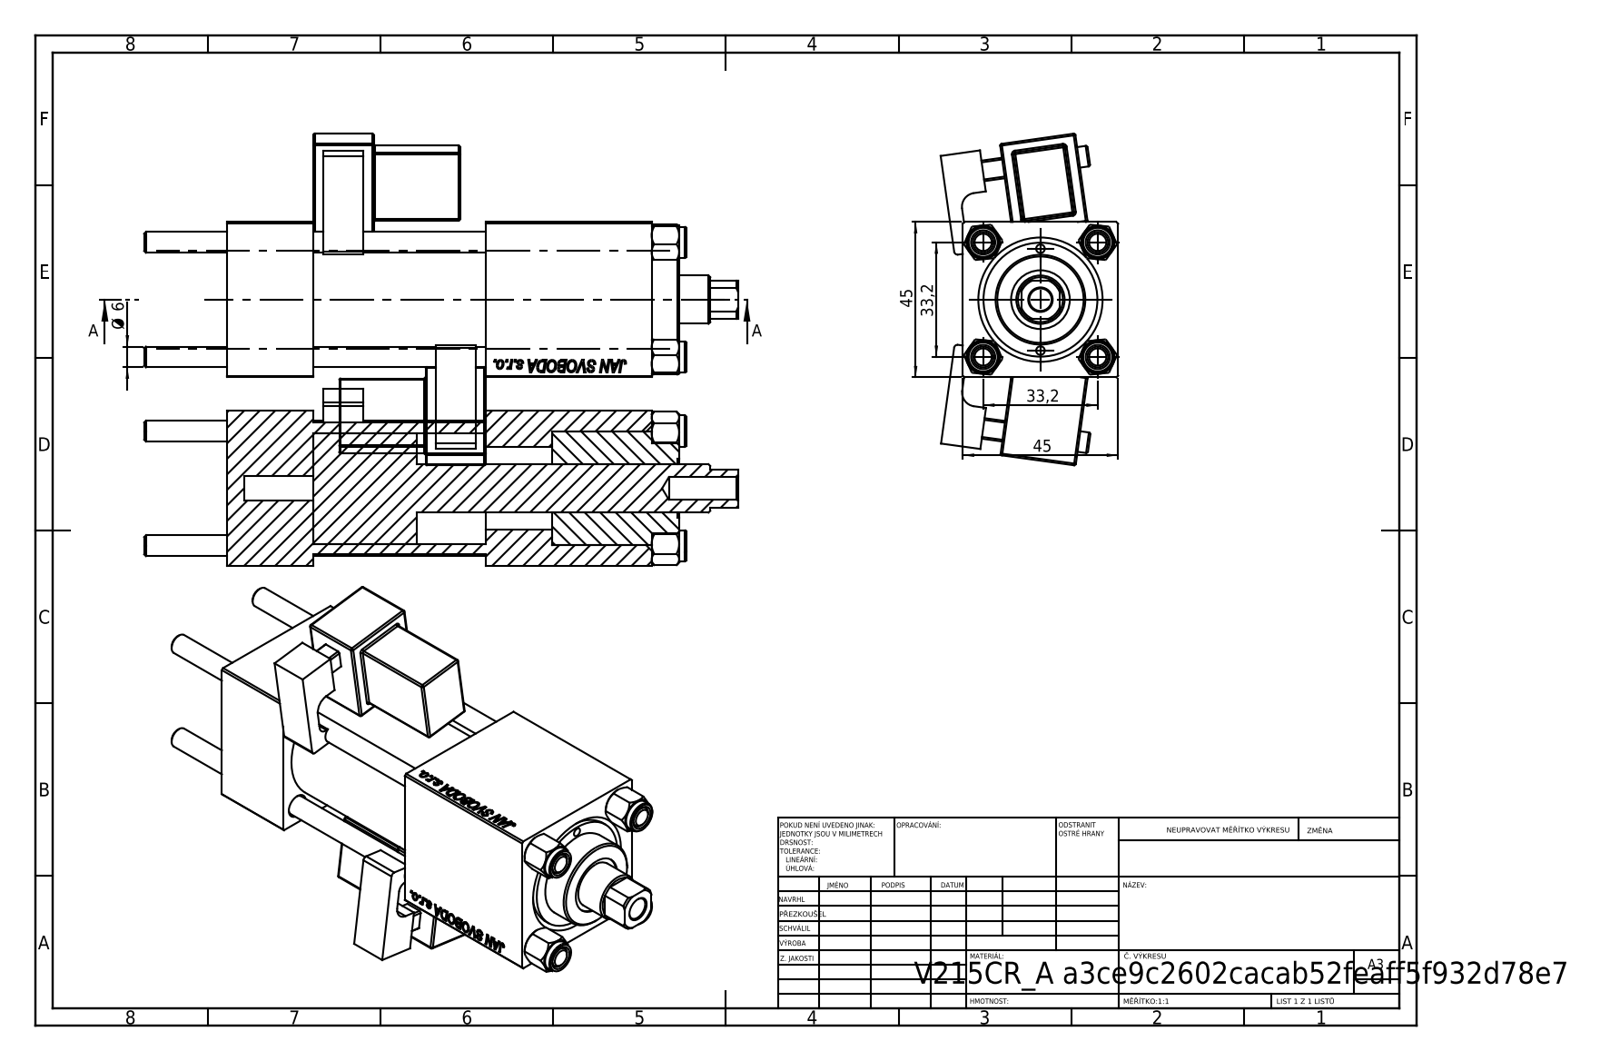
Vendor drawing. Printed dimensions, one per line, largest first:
45
45
33,2
33,2
Ø 6
